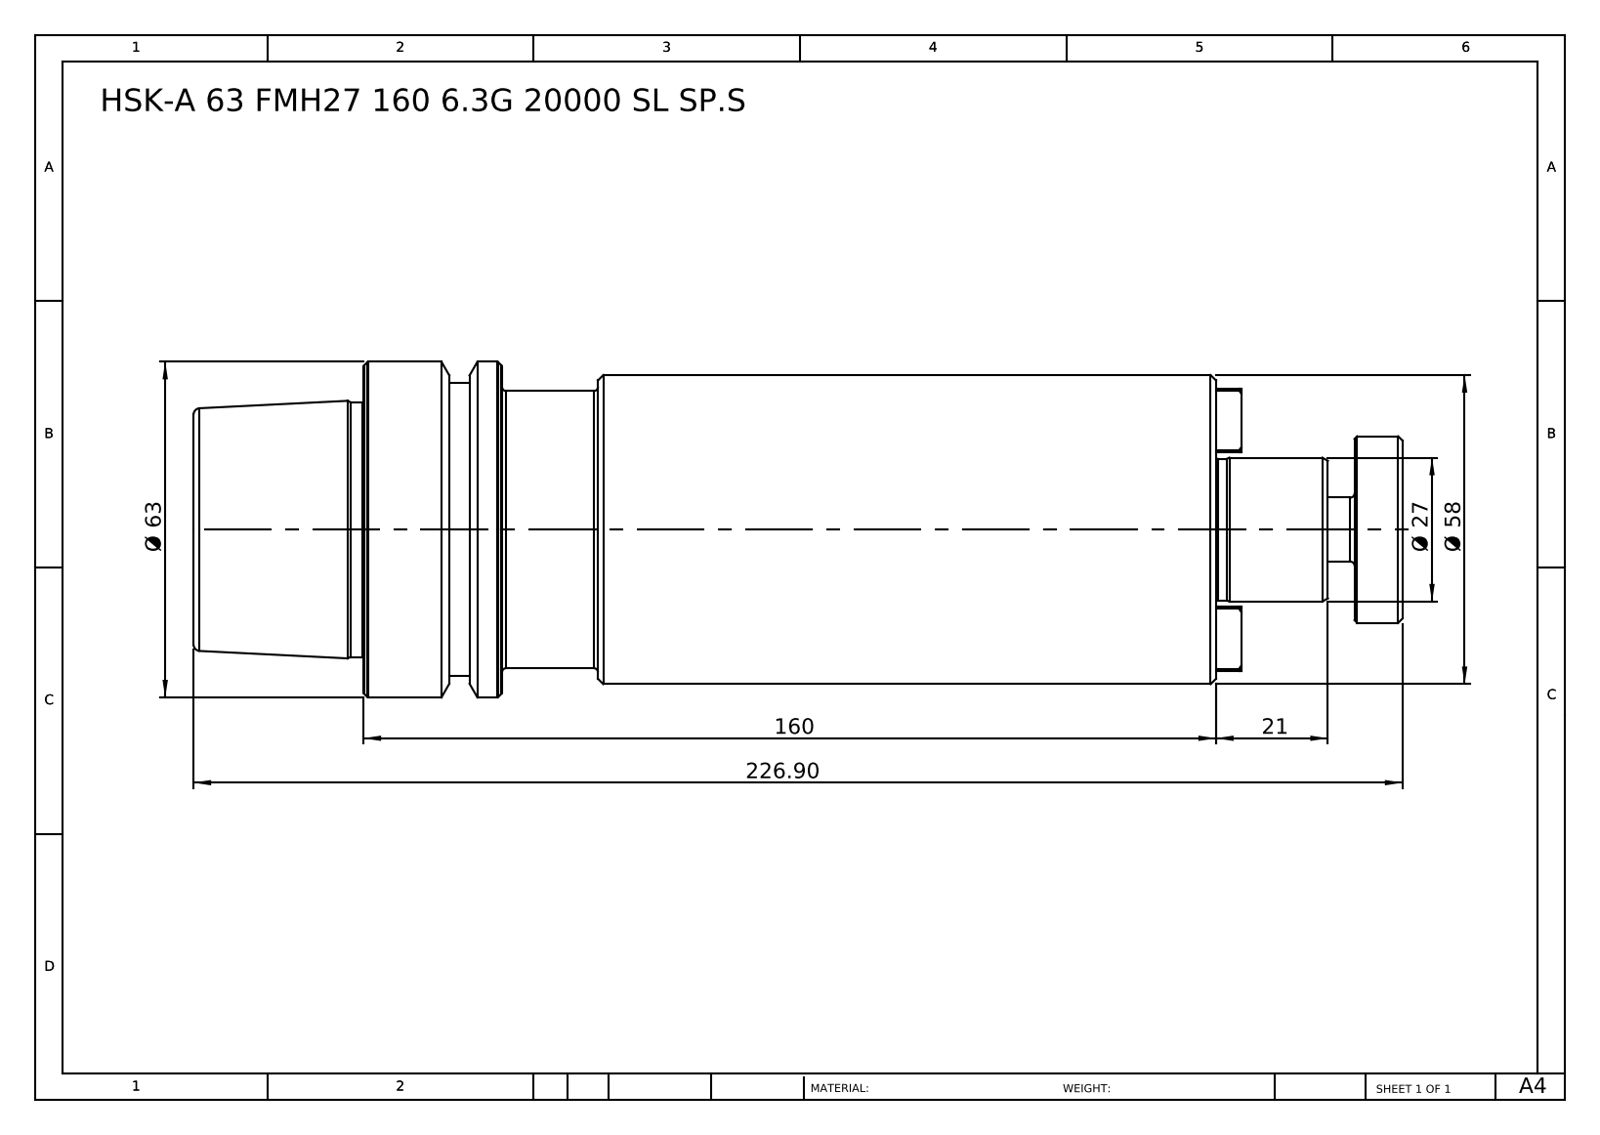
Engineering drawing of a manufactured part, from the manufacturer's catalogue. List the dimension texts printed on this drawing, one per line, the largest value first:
226.90
160
Ø 63
Ø 58
Ø 27
21
